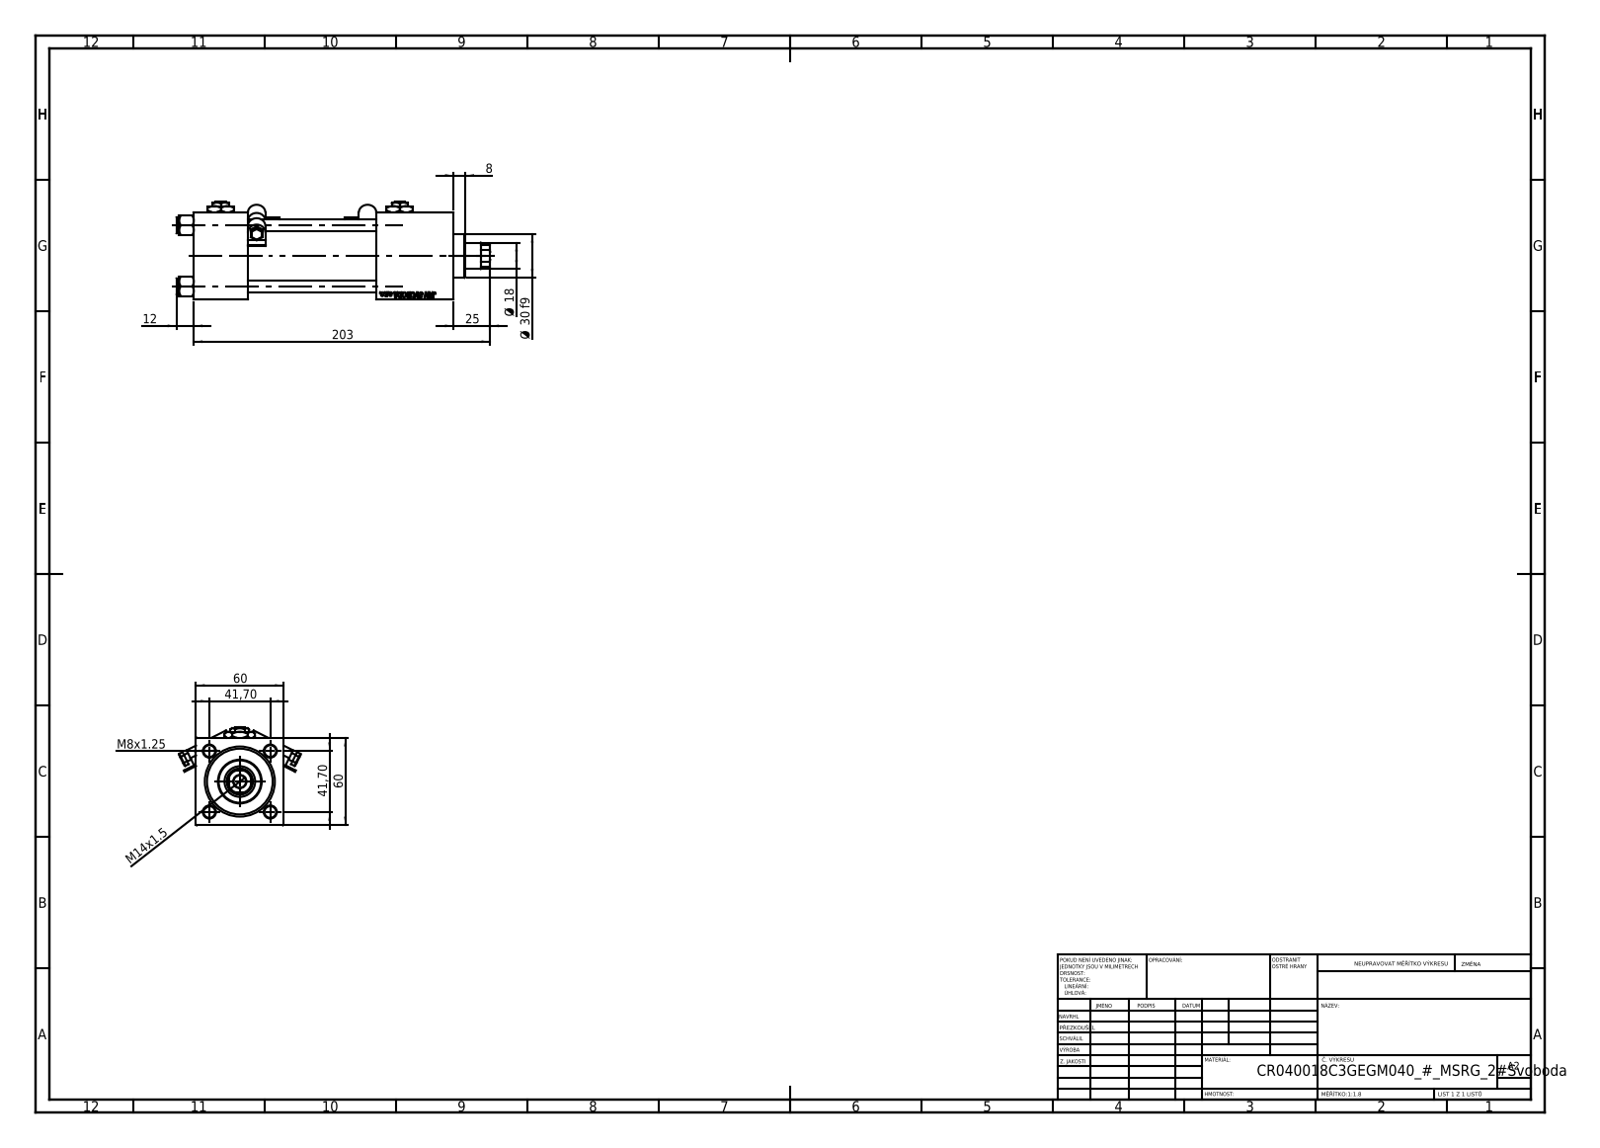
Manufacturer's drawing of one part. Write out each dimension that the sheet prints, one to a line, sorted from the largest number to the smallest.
203
60
60
41,70
41,70
Ø 30 f9
25
Ø 18
M14x1.5
12
8
M8x1.25
